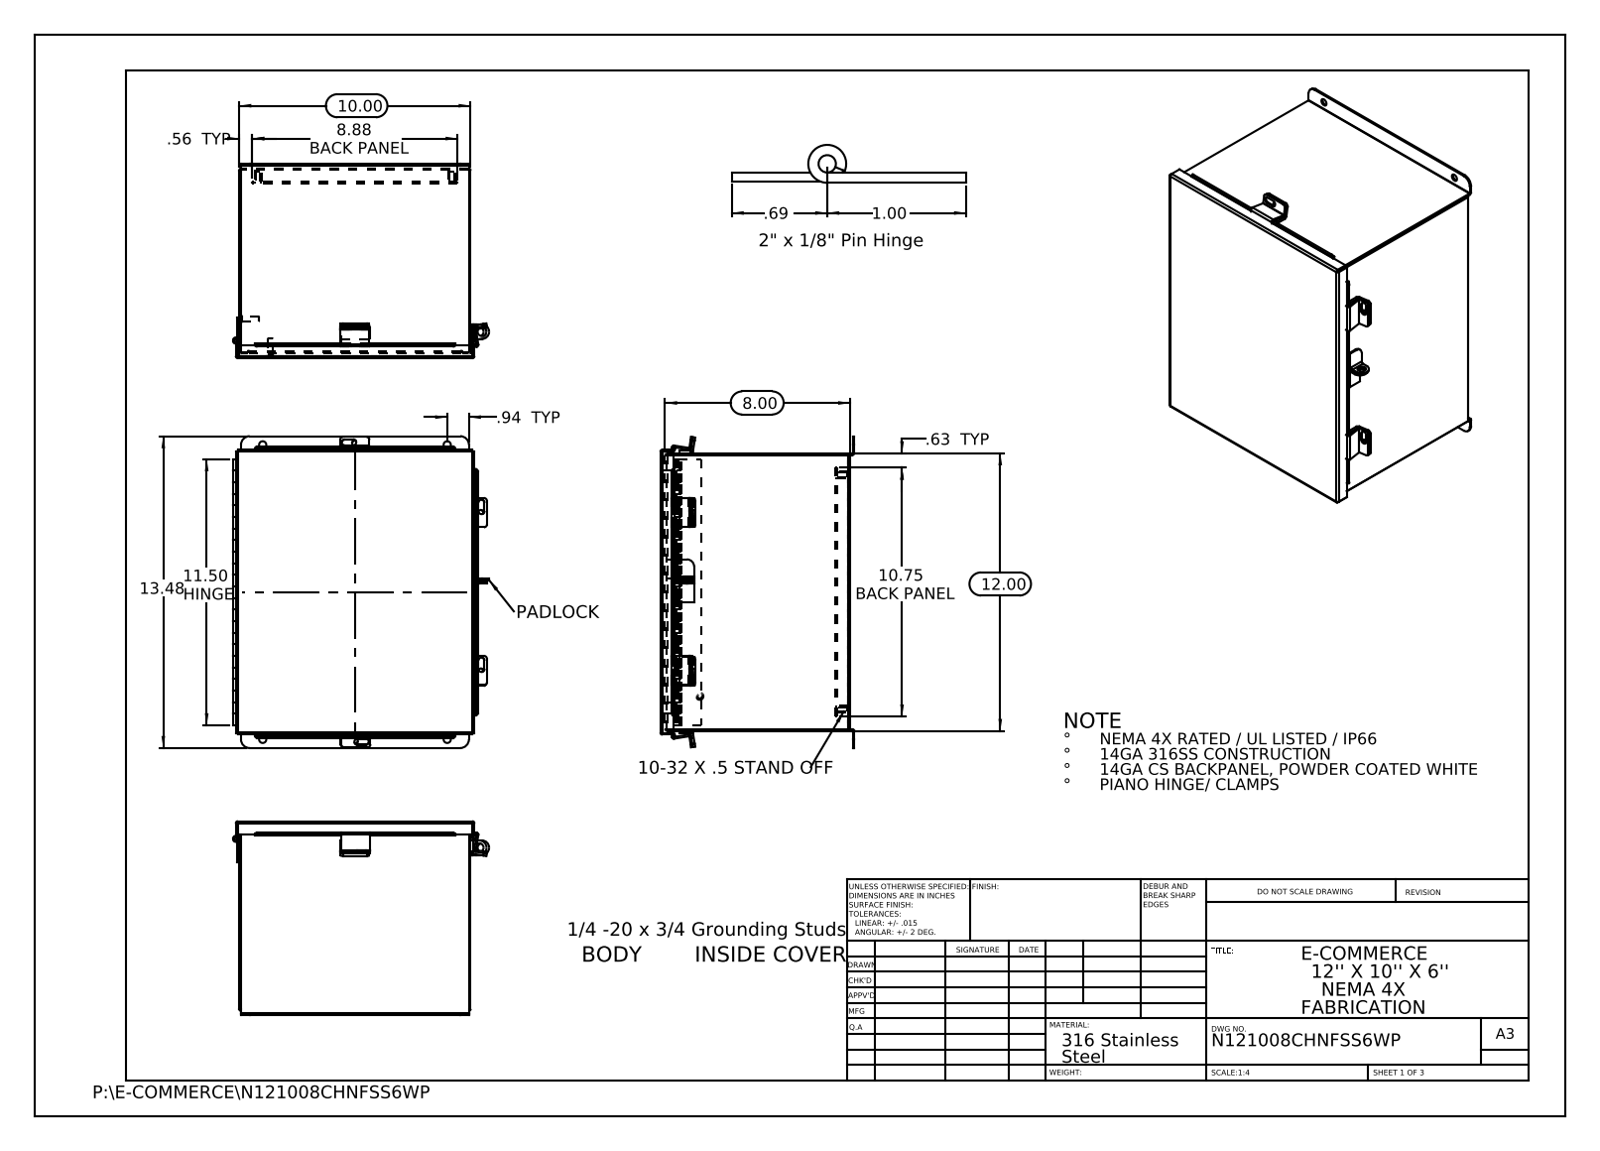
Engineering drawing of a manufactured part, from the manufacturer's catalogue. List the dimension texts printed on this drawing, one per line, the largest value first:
13.48
12.00
11.50 HINGE
10.75 BACK PANEL
10.00
8.88 BACK PANEL
8.00
1.00
.94 TYP
.69
.63 TYP
.56 TYP
